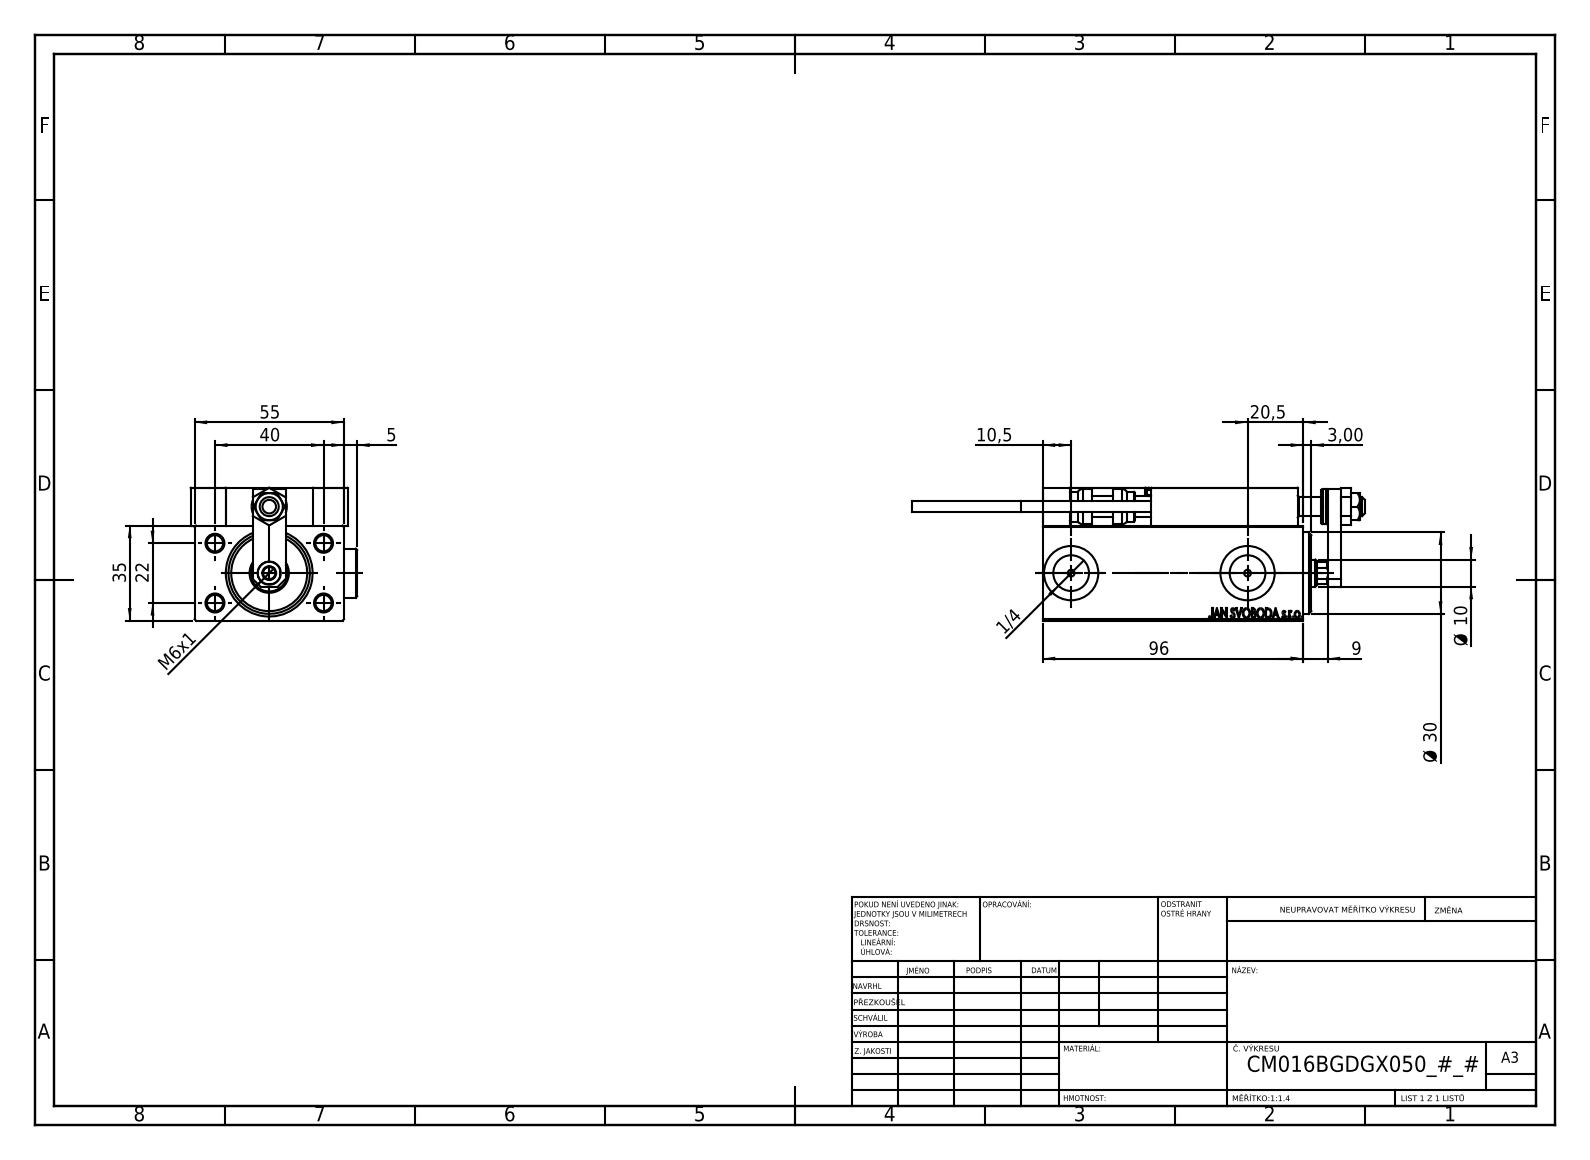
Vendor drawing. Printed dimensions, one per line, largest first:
96
55
40
35
Ø 30
22
20,5
10,5
Ø 10
9
M6x1
5
3,00
1/4
